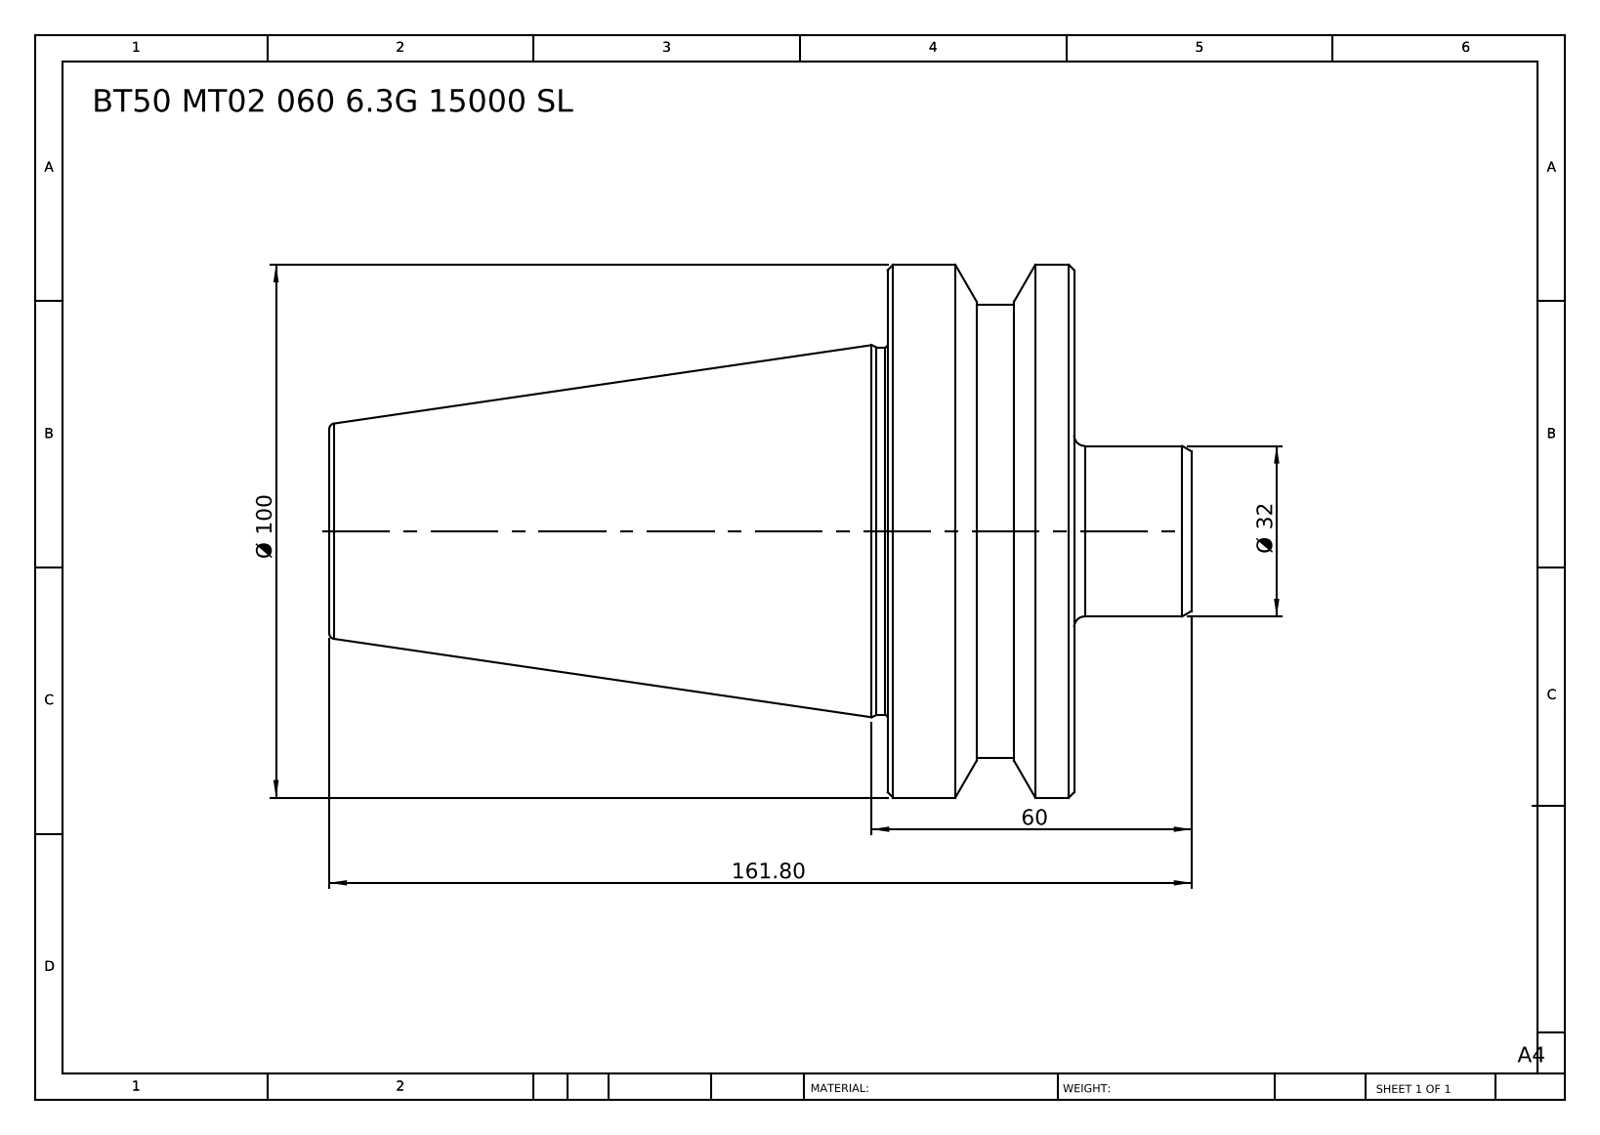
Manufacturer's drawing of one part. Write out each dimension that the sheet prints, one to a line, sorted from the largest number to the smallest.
161.80
Ø 100
60
Ø 32
